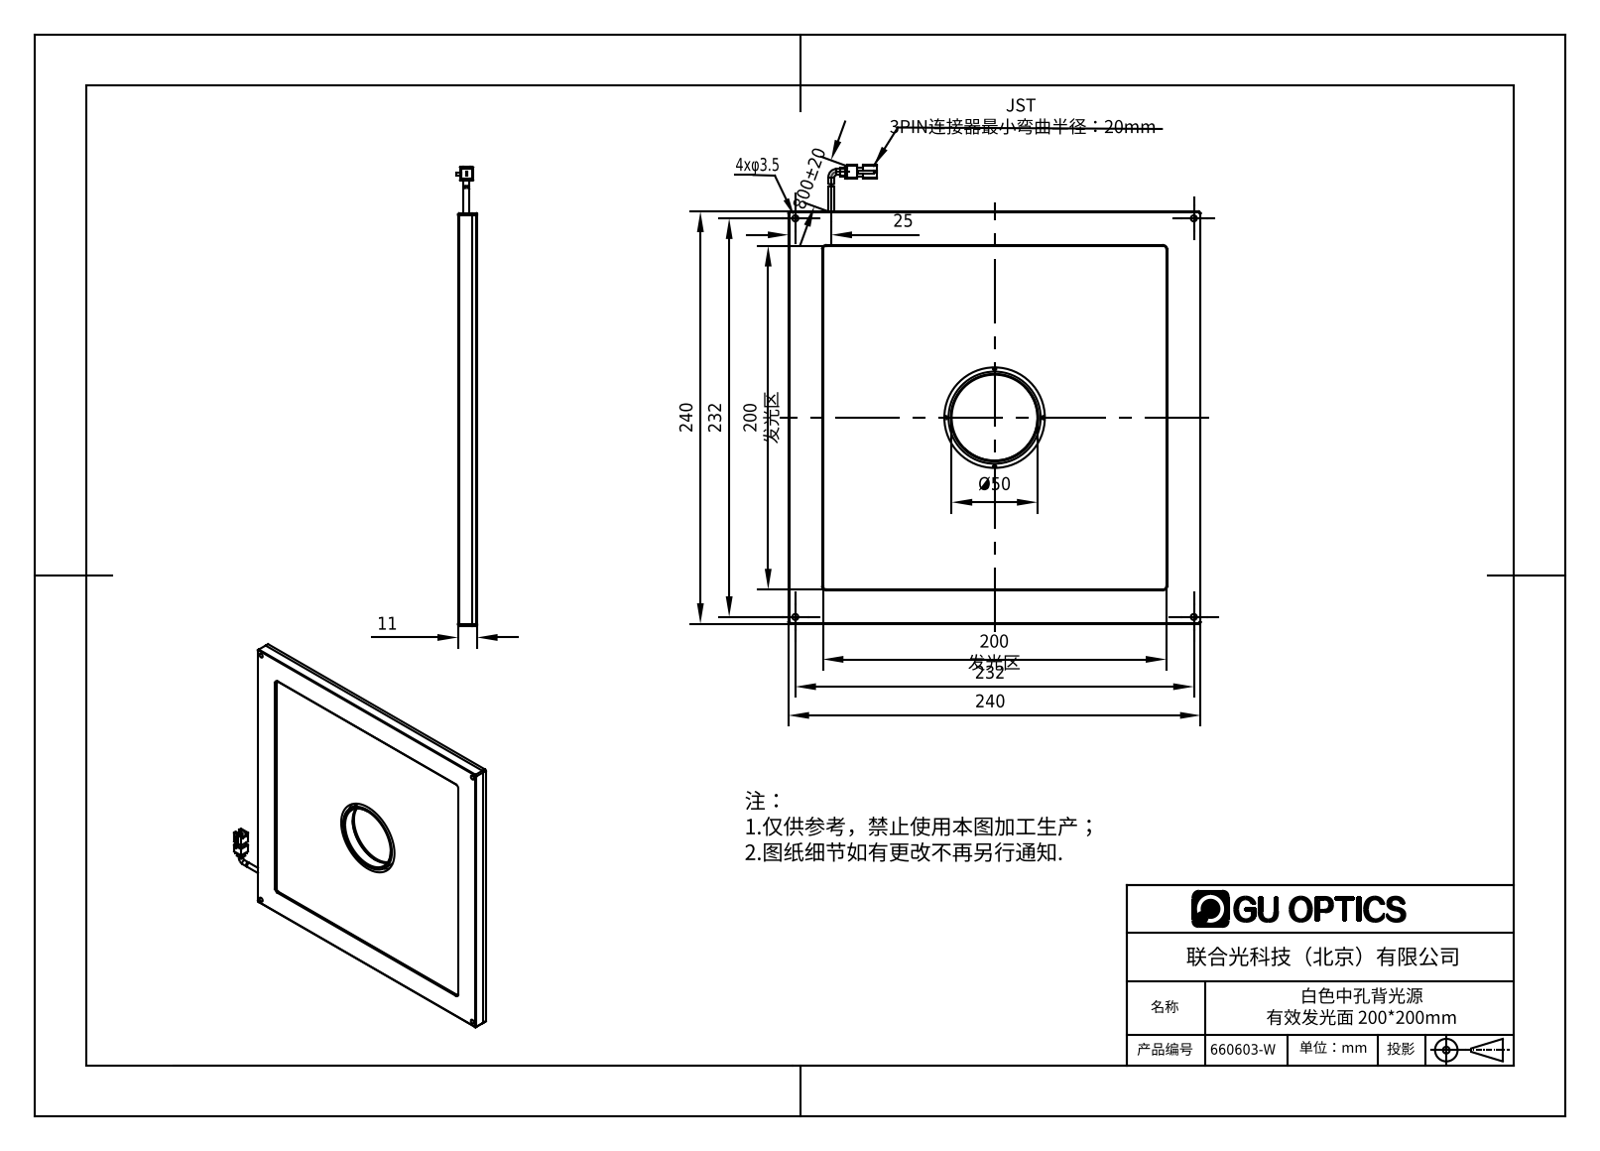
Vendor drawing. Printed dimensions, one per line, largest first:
800±20
240
240
232
232
200 发光区
200 发光区
Ø50
25
11
